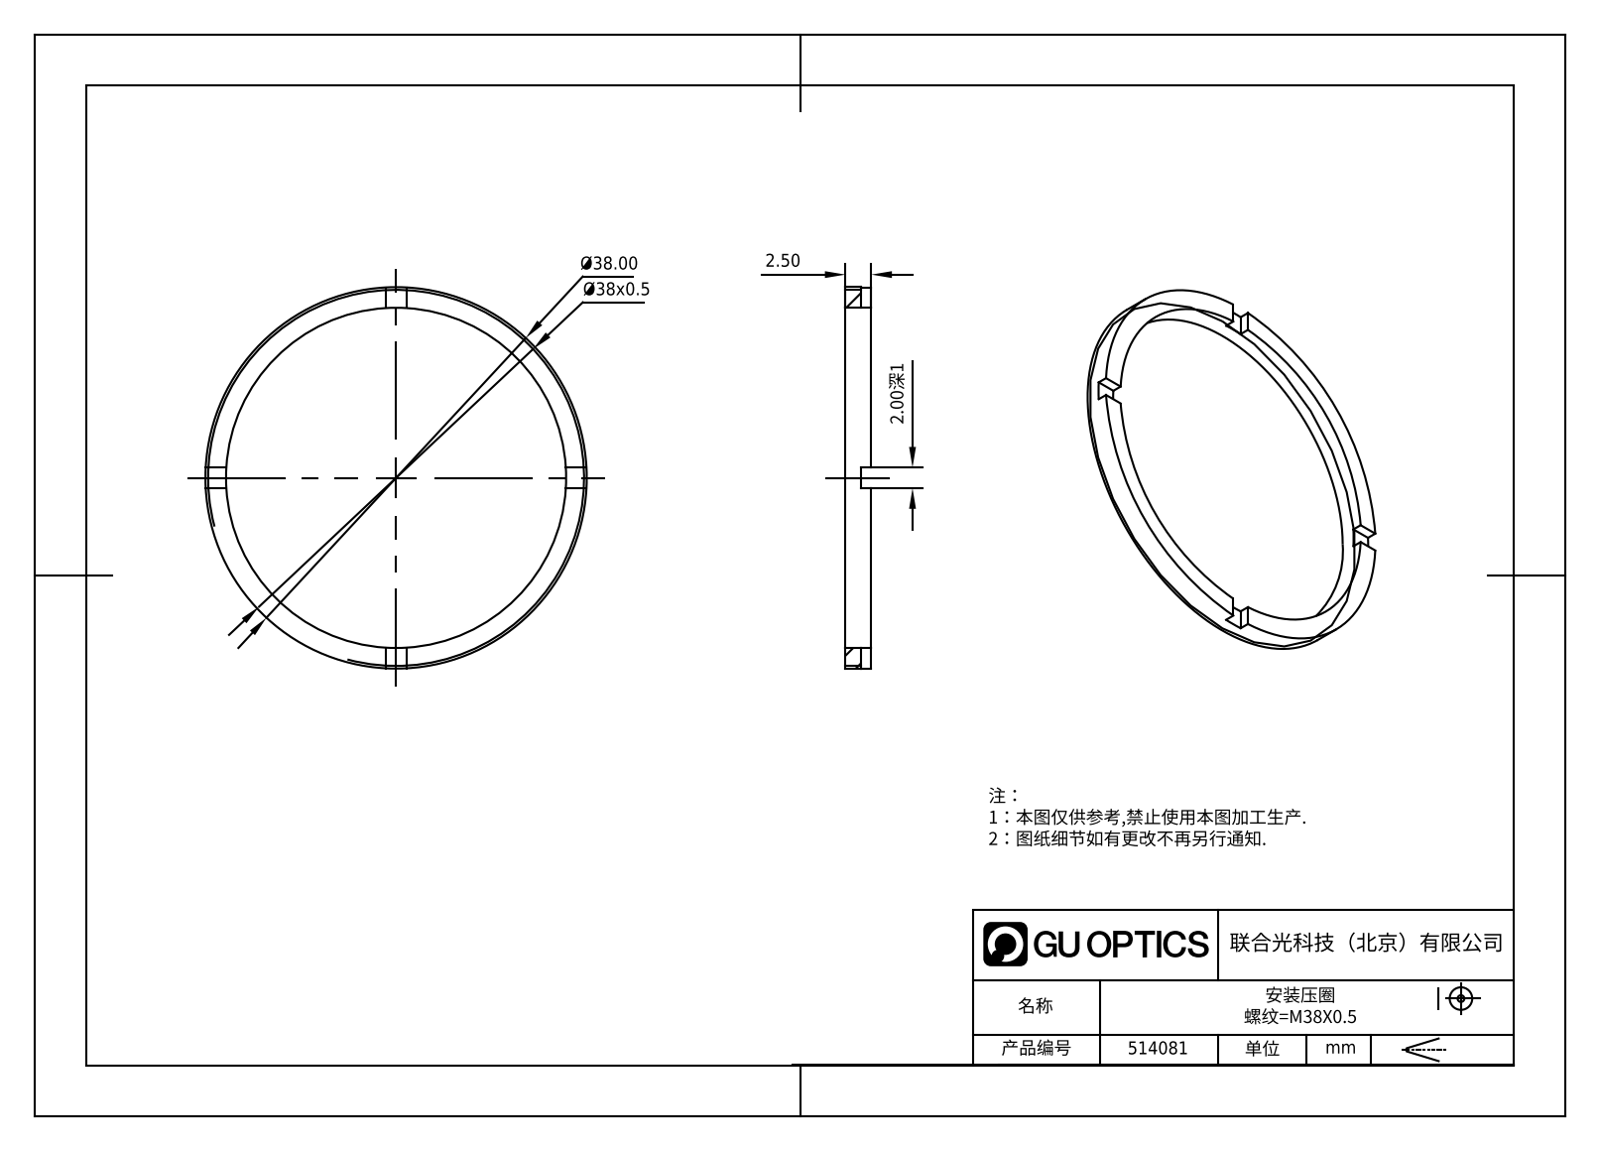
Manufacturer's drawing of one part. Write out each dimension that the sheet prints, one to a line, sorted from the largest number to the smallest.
Ø38.00
Ø38x0.5
2.50
2.00深1
